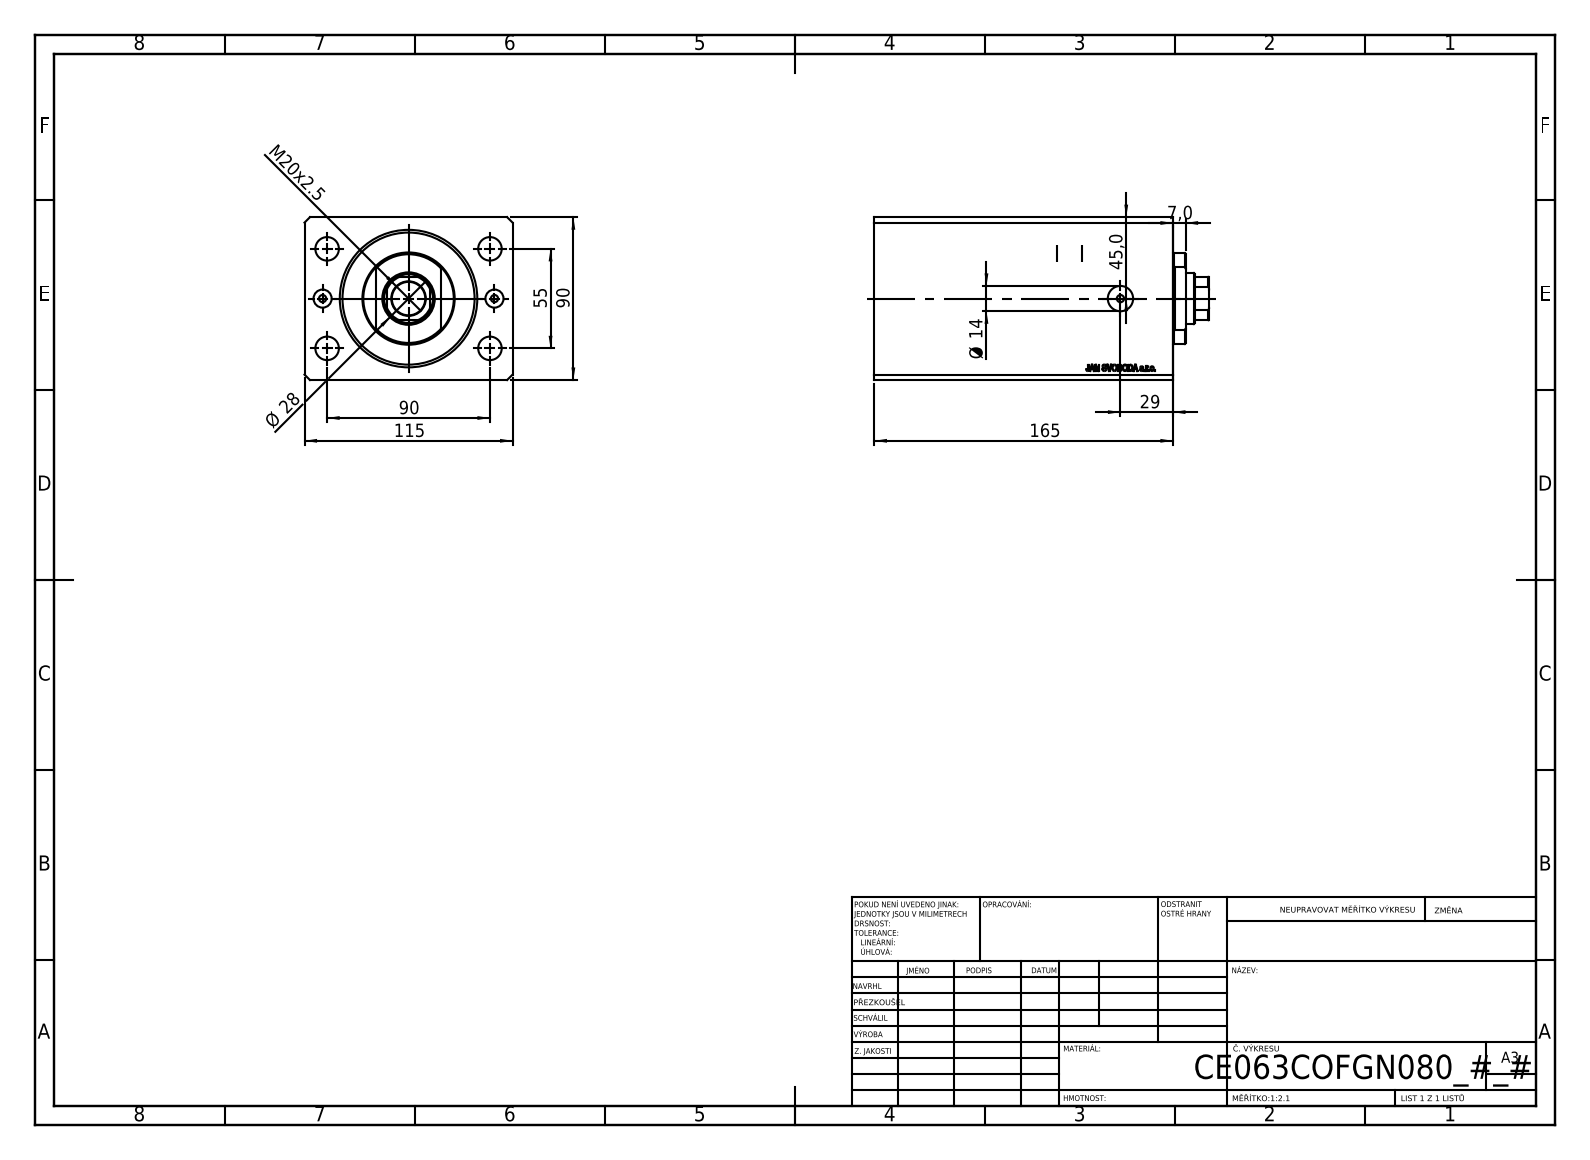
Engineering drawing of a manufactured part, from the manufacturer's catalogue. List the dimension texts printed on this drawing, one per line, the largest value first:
165
115
90
90
55
45,0
29
Ø 28
M20x2.5
Ø 14
7,0
